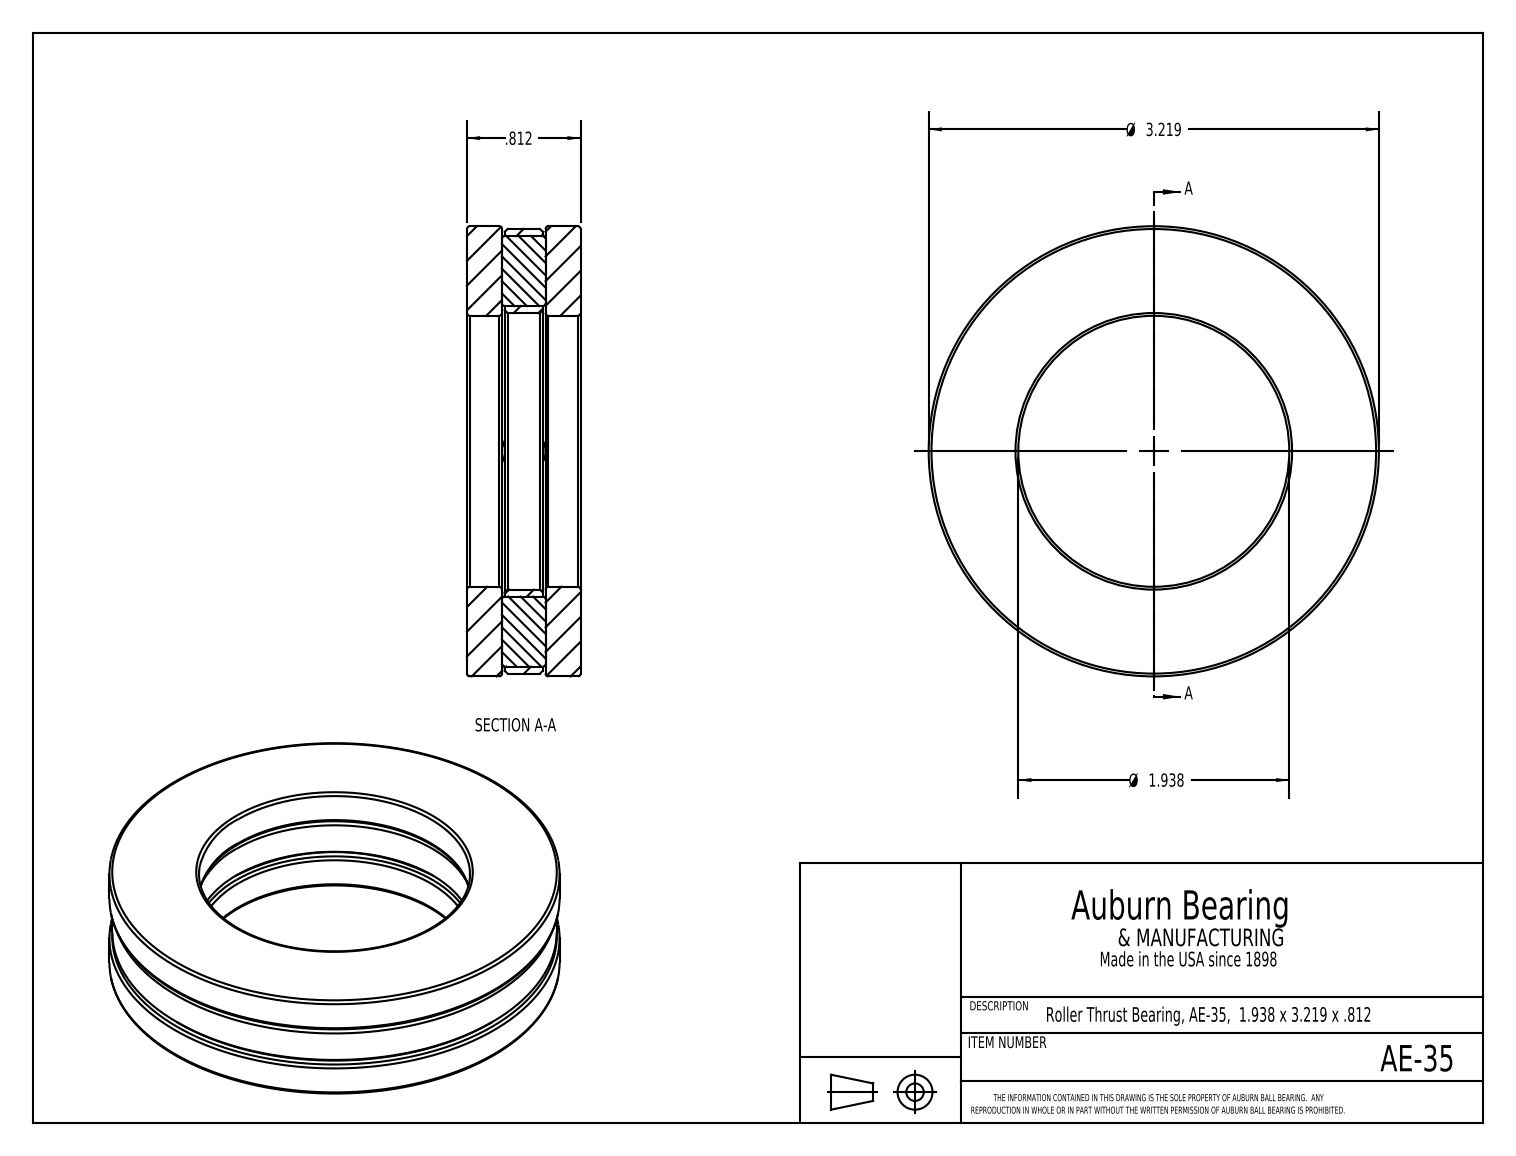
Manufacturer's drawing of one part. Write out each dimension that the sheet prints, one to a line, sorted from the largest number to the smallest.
Ø 3.219
Ø 1.938
.812
